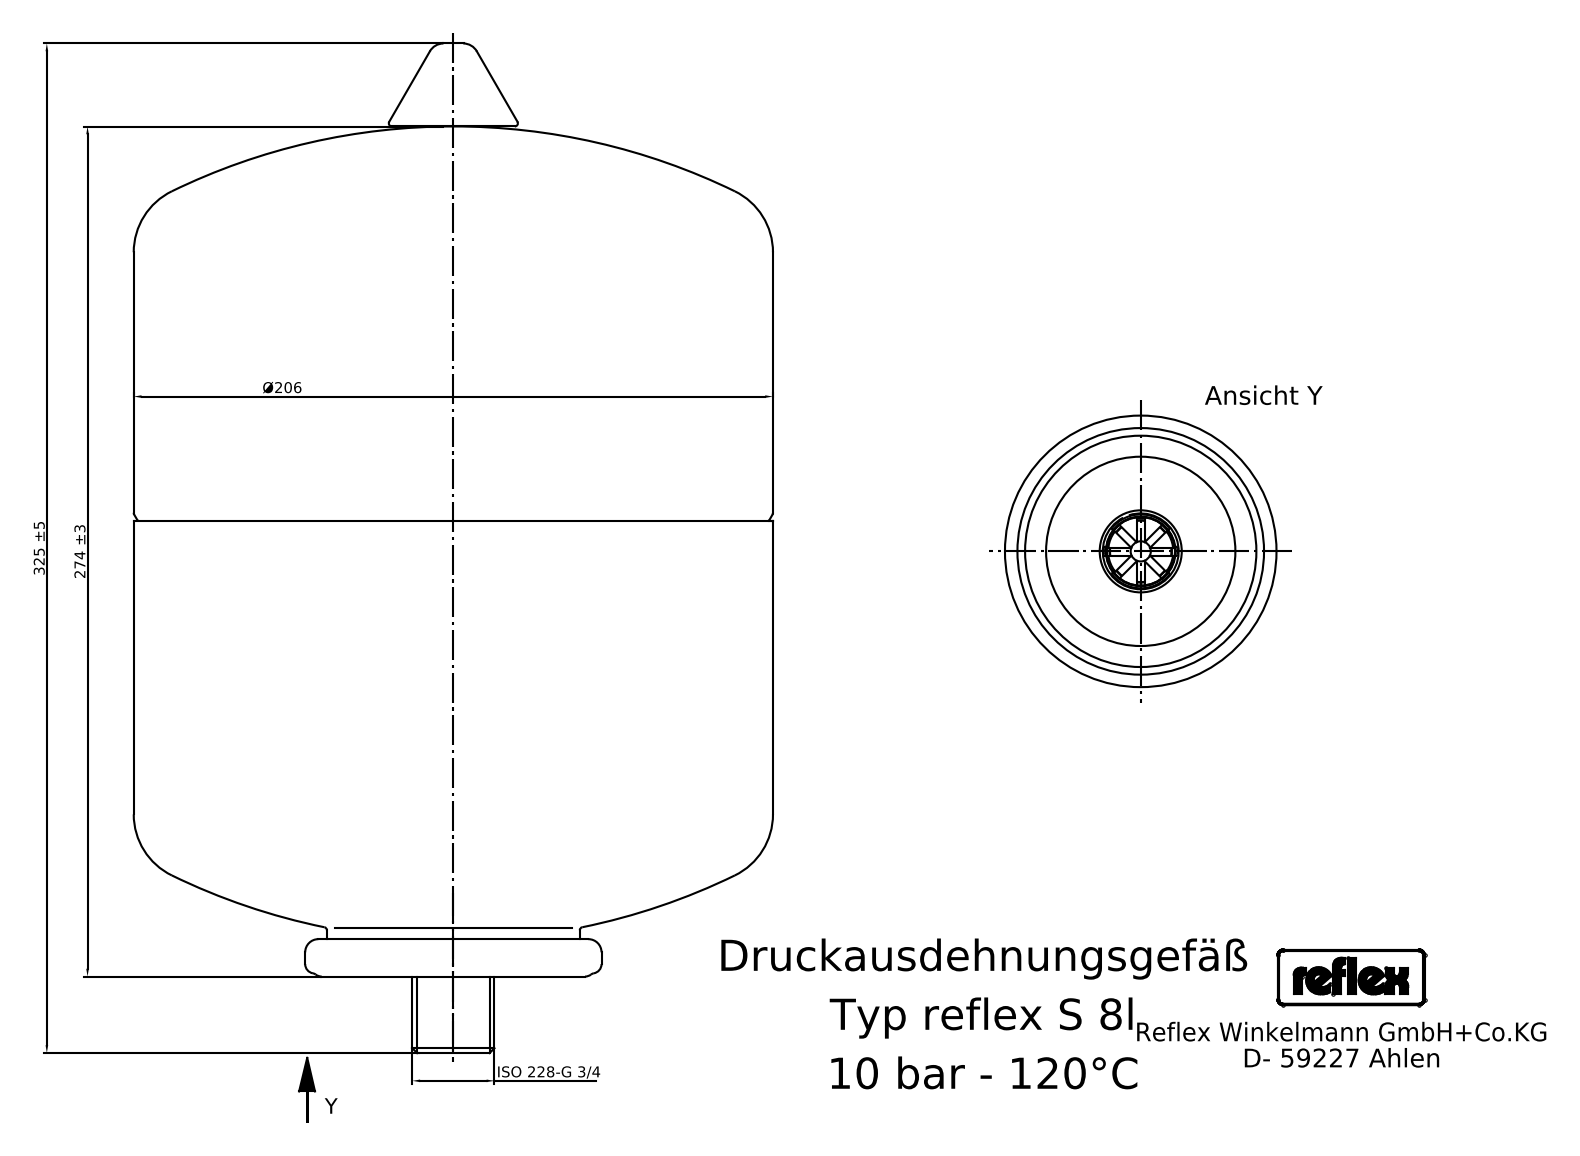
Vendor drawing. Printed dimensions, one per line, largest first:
325 ±5
274 ±3
ISO 228-G 3/4
Ø206
